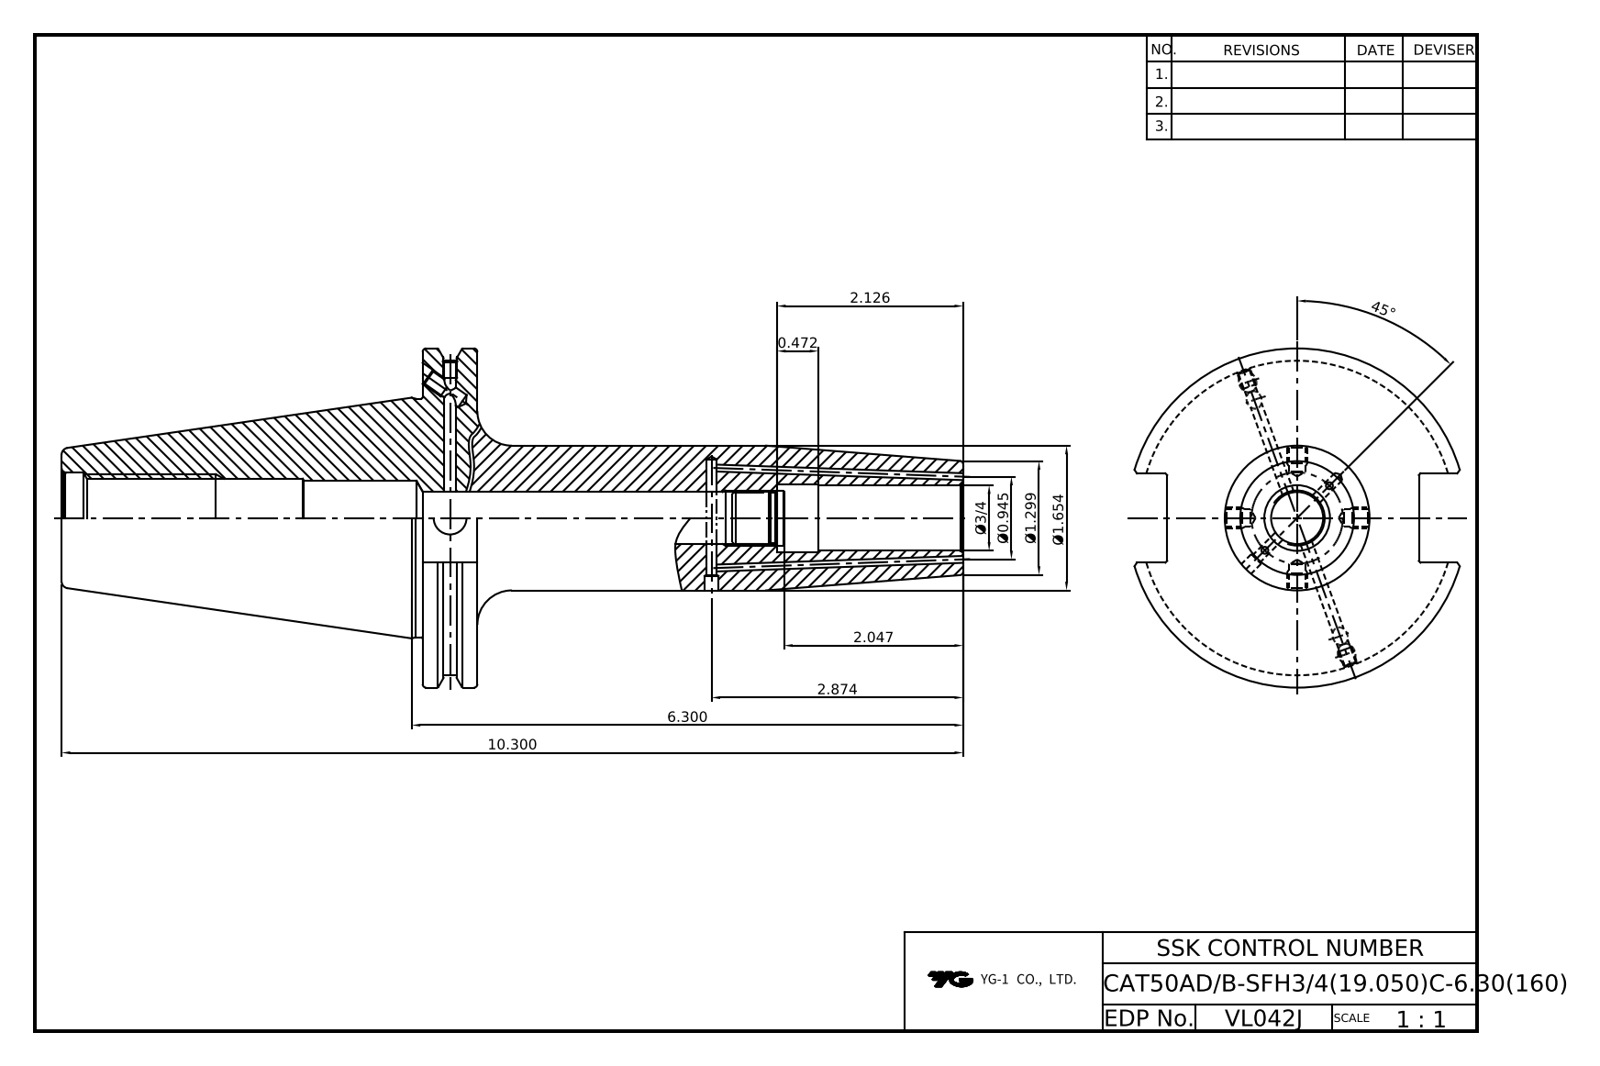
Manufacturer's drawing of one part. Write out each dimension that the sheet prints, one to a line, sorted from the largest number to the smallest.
45°
10.300
6.300
2.874
2.126
2.047
Ø1.654
Ø1.299
Ø0.945
Ø3/4
0.472
